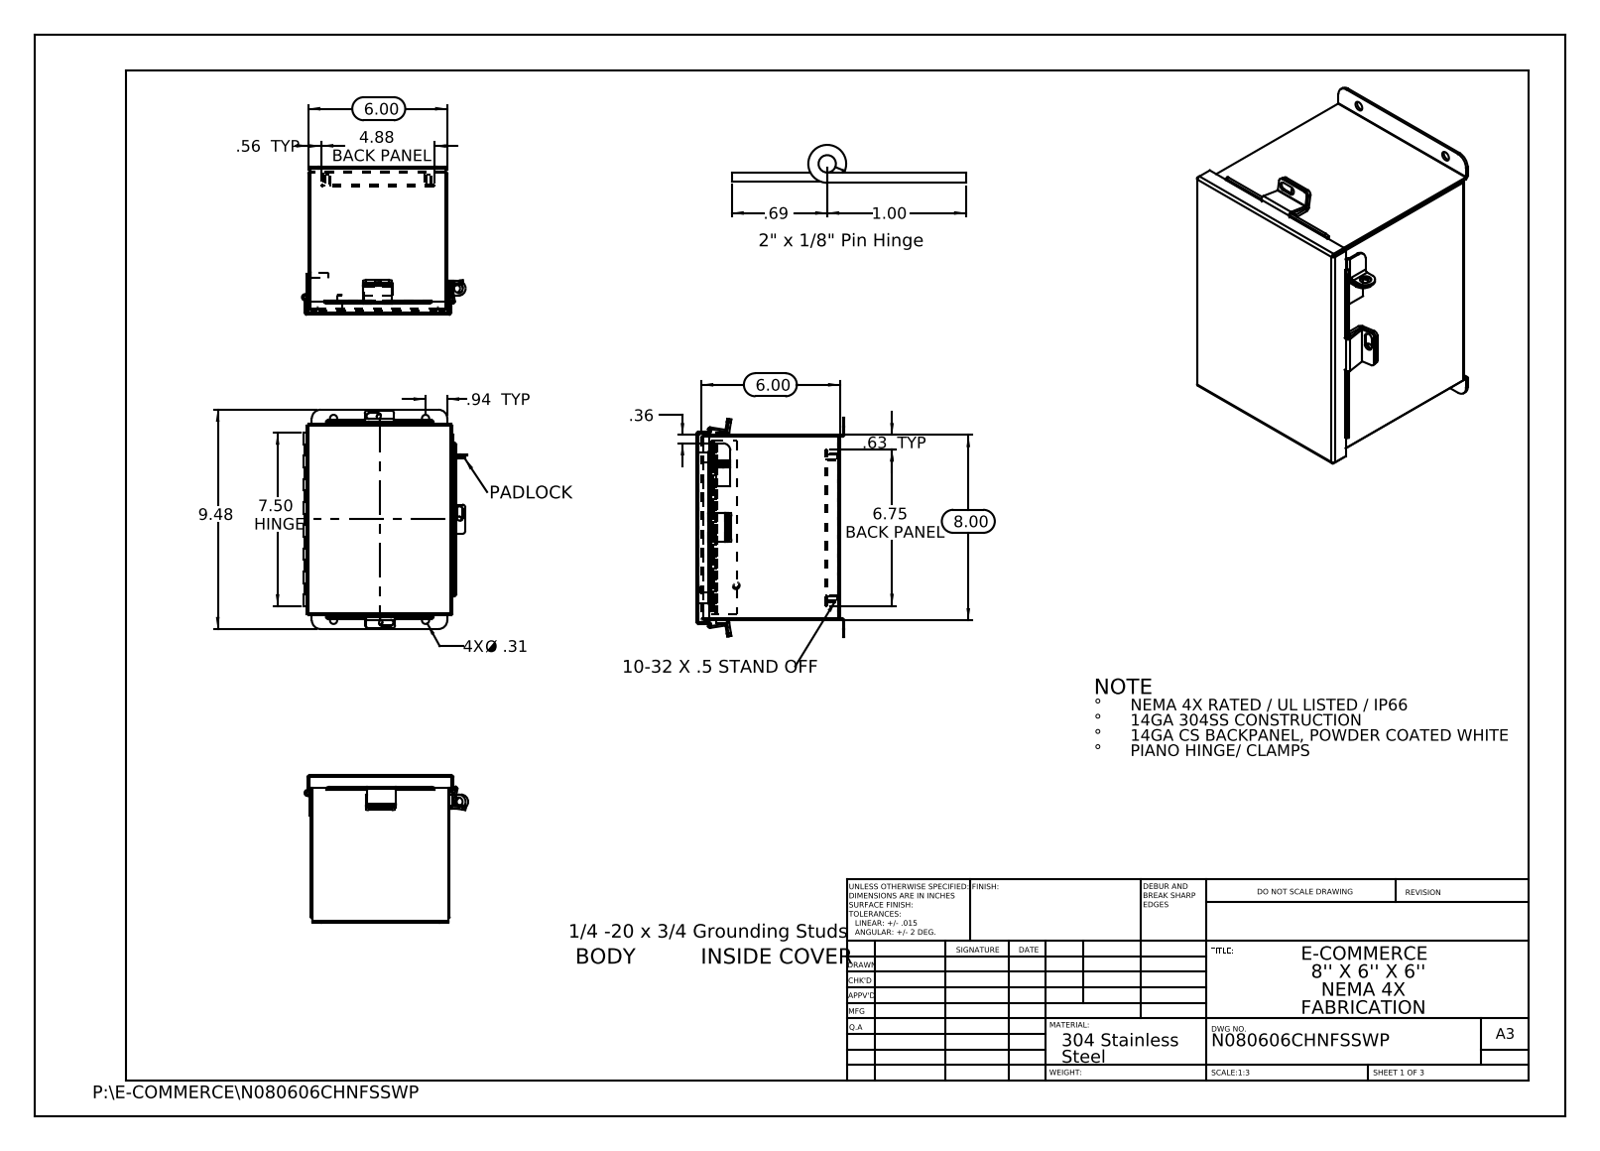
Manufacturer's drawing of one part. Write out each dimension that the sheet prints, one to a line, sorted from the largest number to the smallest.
9.48
8.00
7.50 HINGE
6.75 BACK PANEL
6.00
6.00
4.88 BACK PANEL
1.00
.94 TYP
.69
.63 TYP
.56 TYP
.36
4X Ø .31
